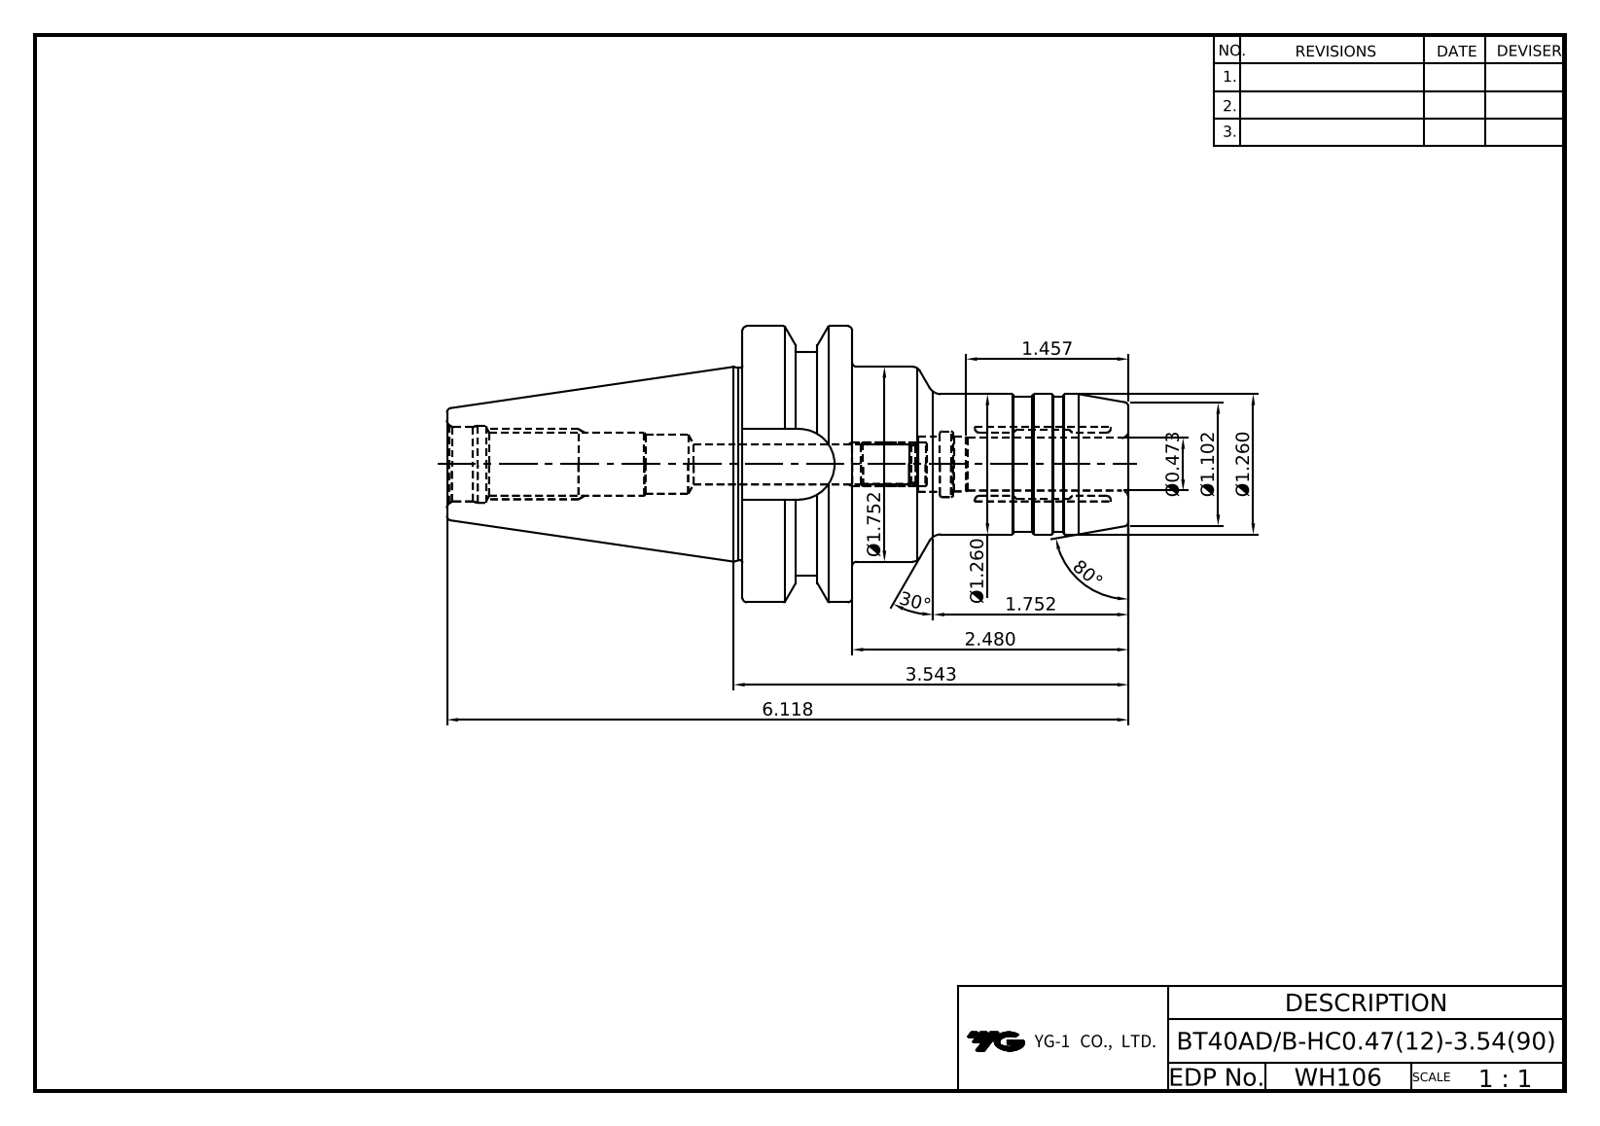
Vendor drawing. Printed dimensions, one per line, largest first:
80°
30°
6.118
3.543
2.480
1.752
Ø1.752
1.457
Ø1.260
Ø1.260
Ø1.102
Ø0.473
